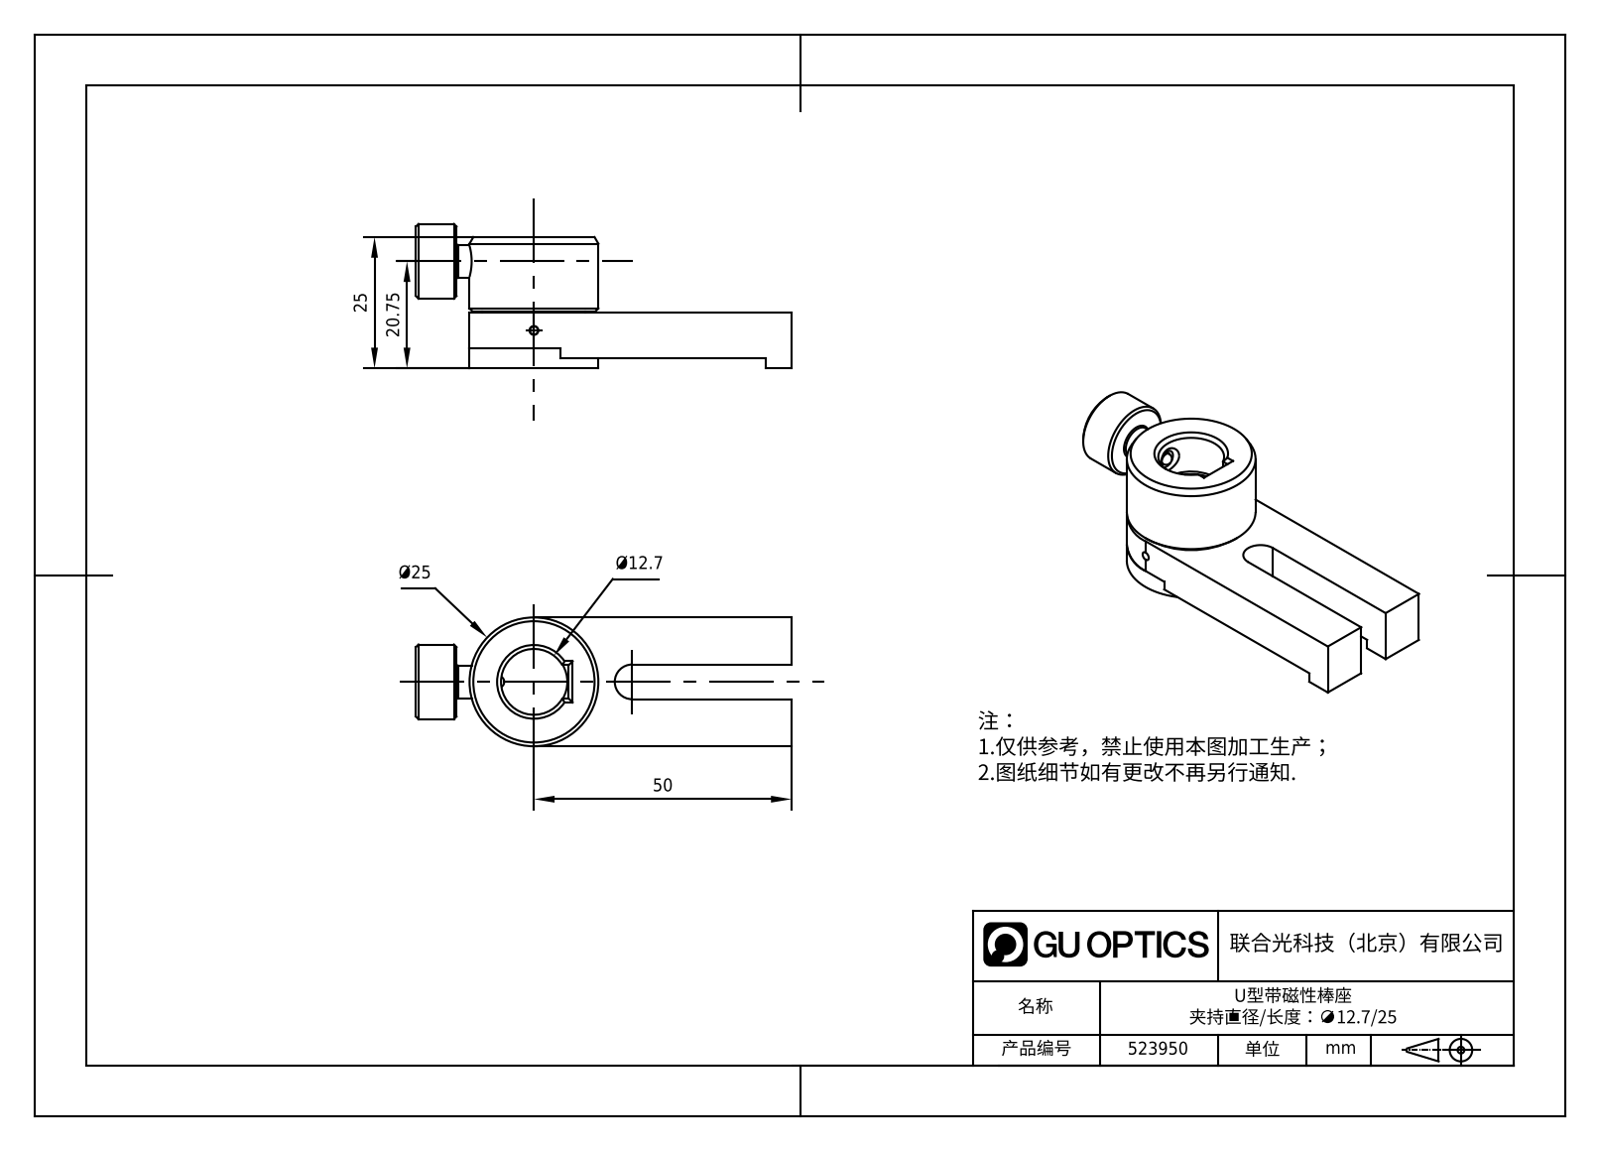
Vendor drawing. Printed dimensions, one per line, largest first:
50
Ø25
25
20.75
Ø12.7
